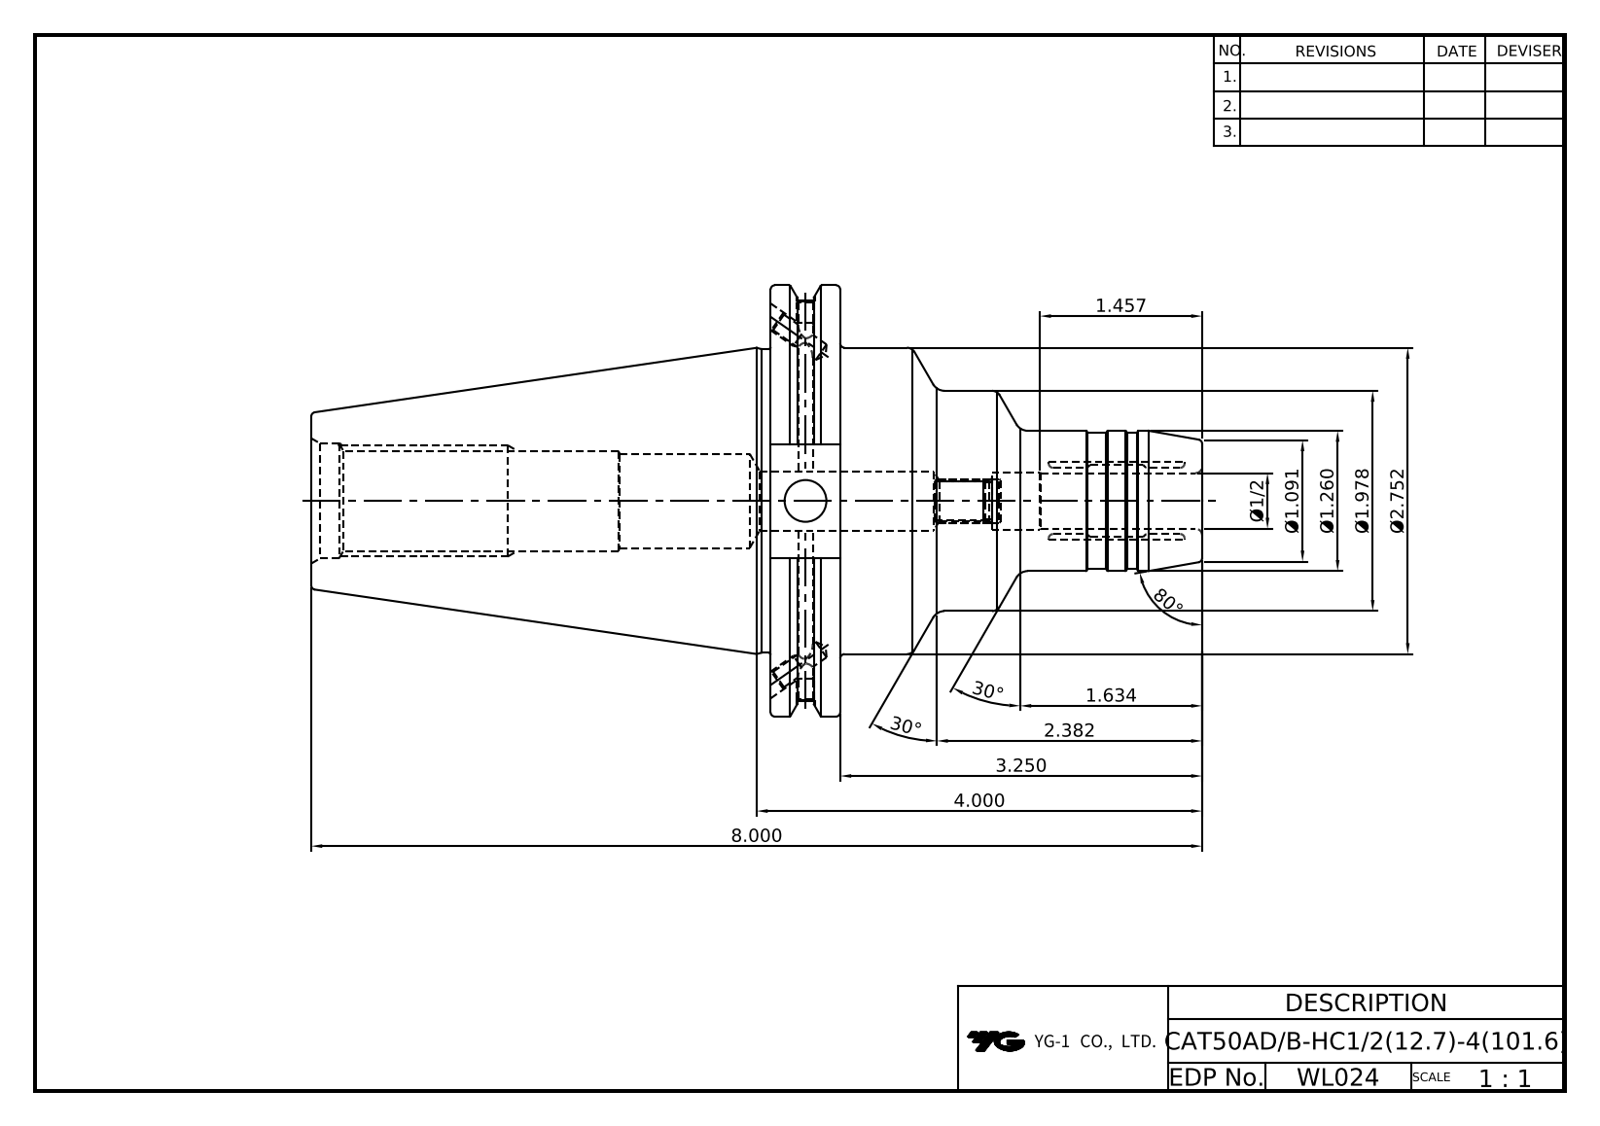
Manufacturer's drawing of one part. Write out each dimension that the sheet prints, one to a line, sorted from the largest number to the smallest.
80°
30°
30°
8.000
4.000
3.250
Ø2.752
2.382
Ø1.978
1.634
1.457
Ø1.260
Ø1.091
Ø1/2
